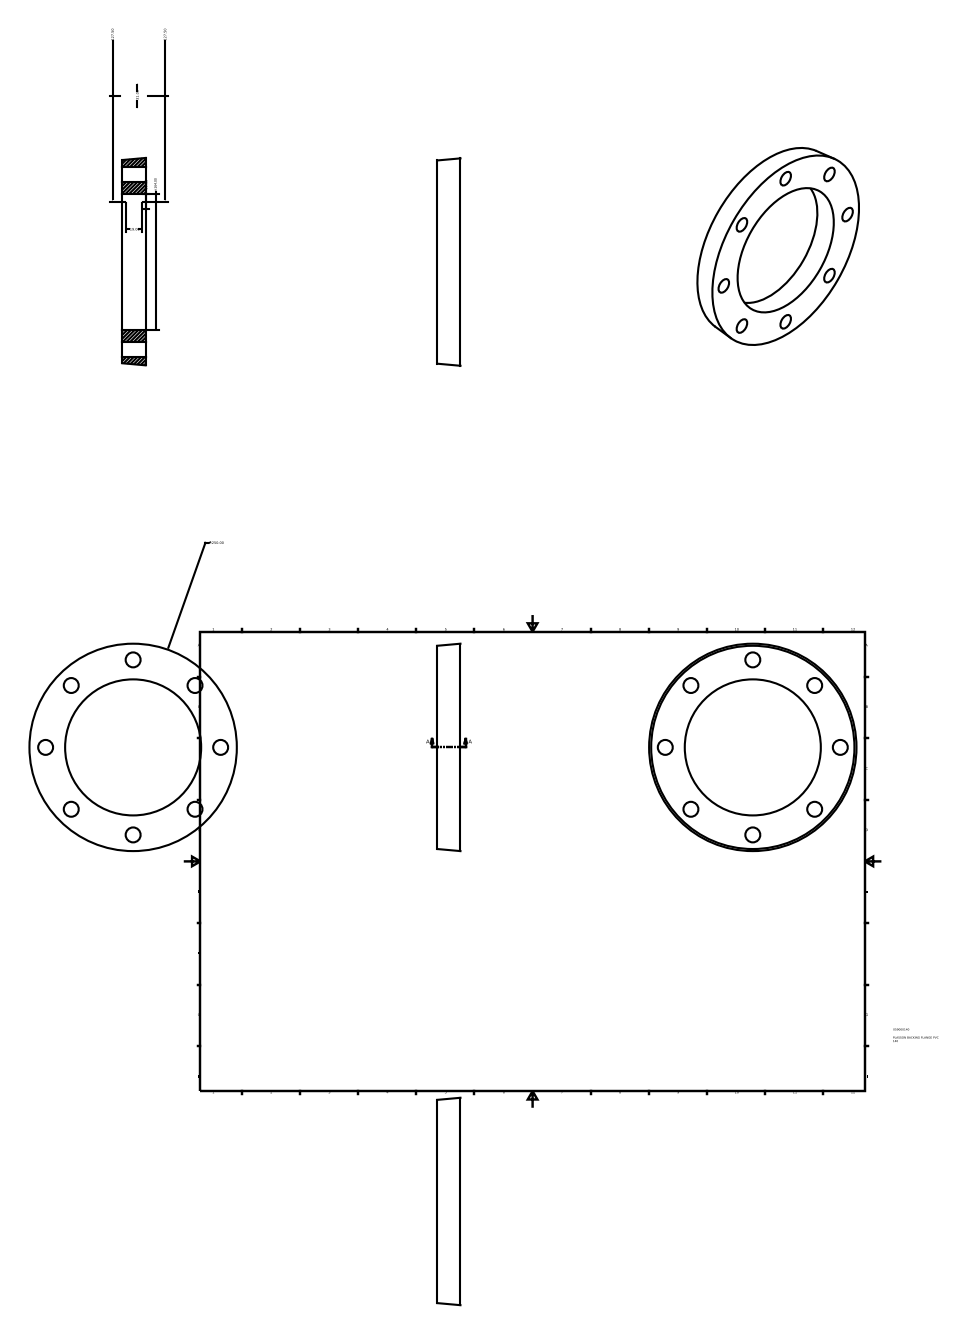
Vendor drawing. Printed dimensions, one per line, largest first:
∅250.00
n164.00
127.50
127.50
31.00
19.00
18.00
